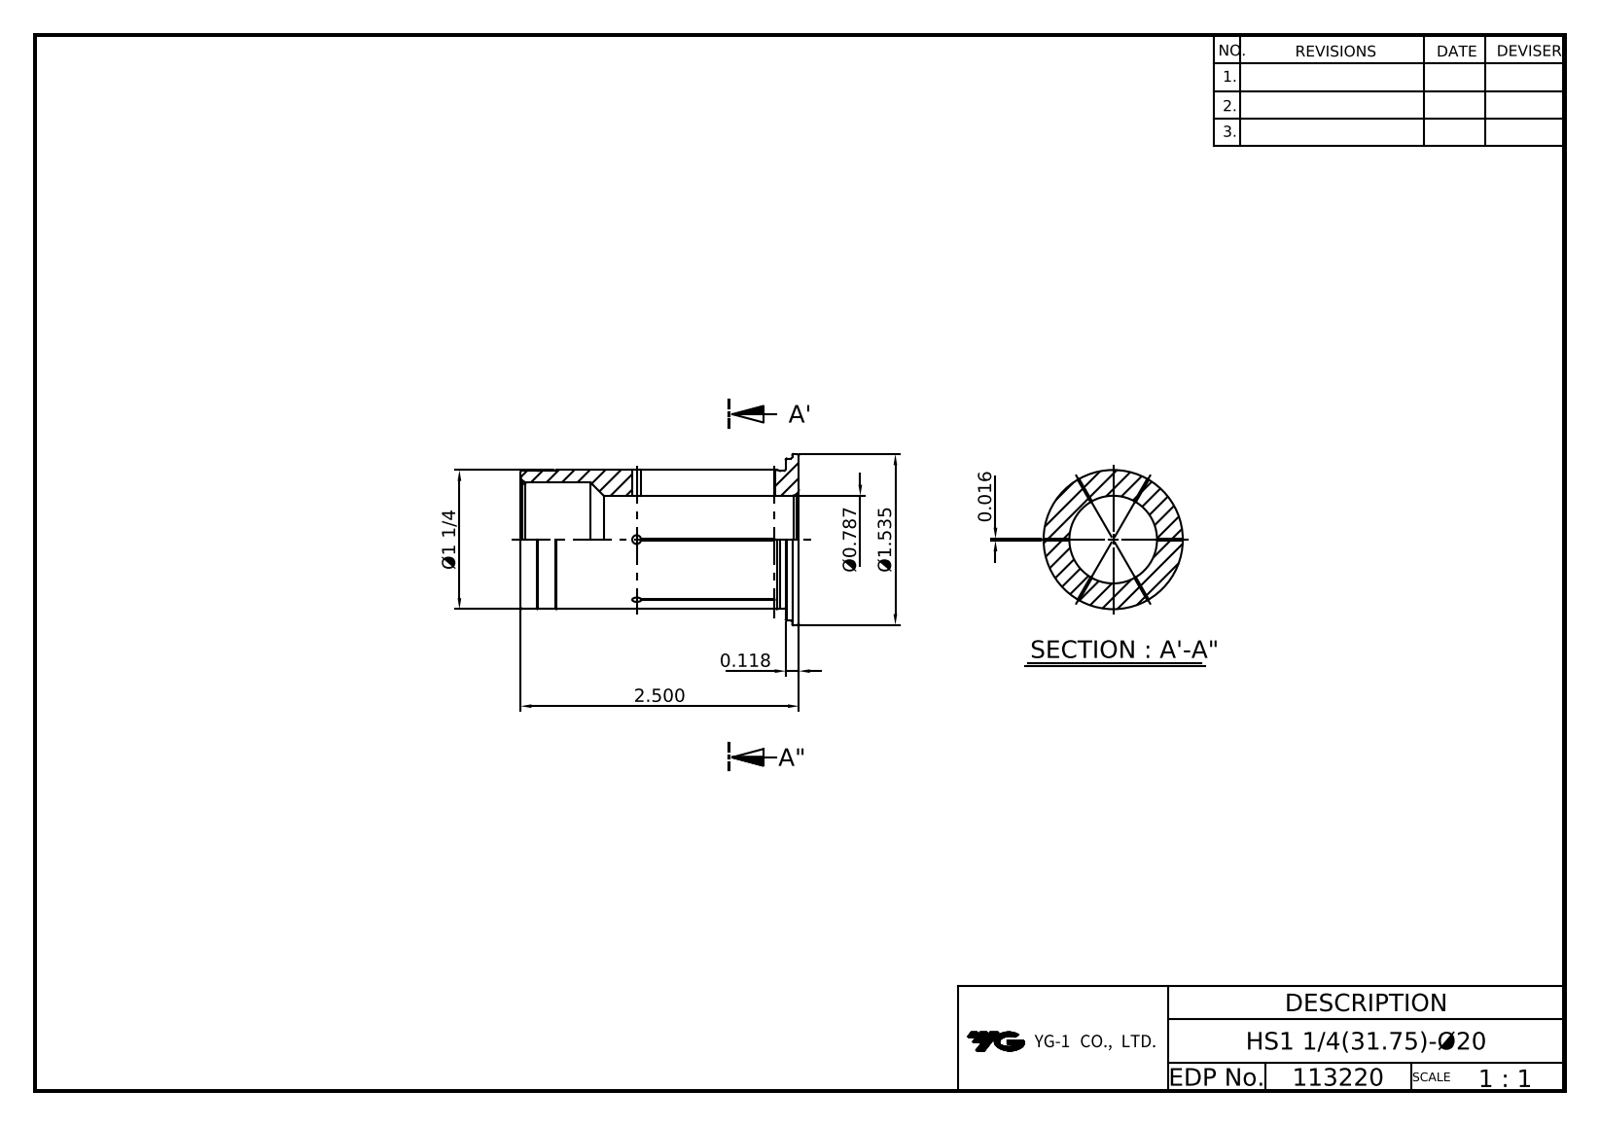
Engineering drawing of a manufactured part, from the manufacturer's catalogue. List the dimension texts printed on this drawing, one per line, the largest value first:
2.500
Ø1.535
Ø1 1/4
0.118
0.016
